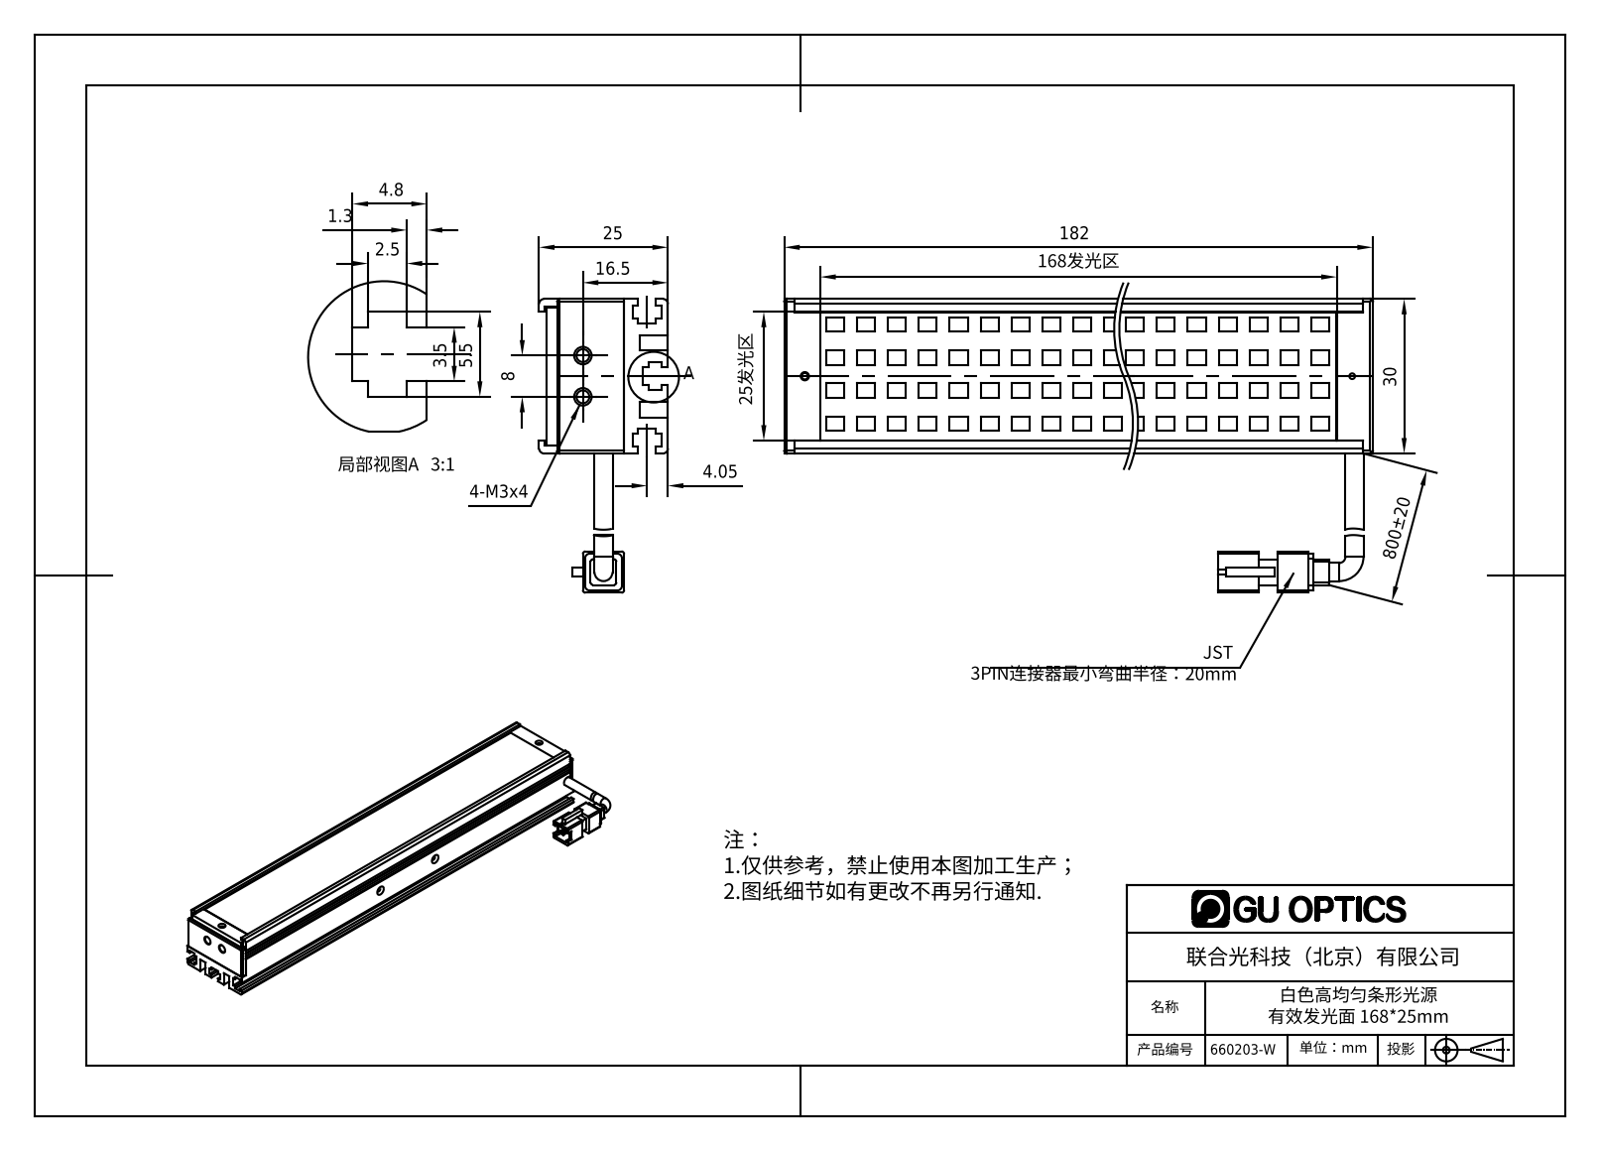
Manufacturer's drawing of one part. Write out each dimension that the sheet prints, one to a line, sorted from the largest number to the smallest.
800±20
182
168发光区
30
25发光区
25
16.5
8
5.5
4.8
4.05
3.5
2.5
1.3
